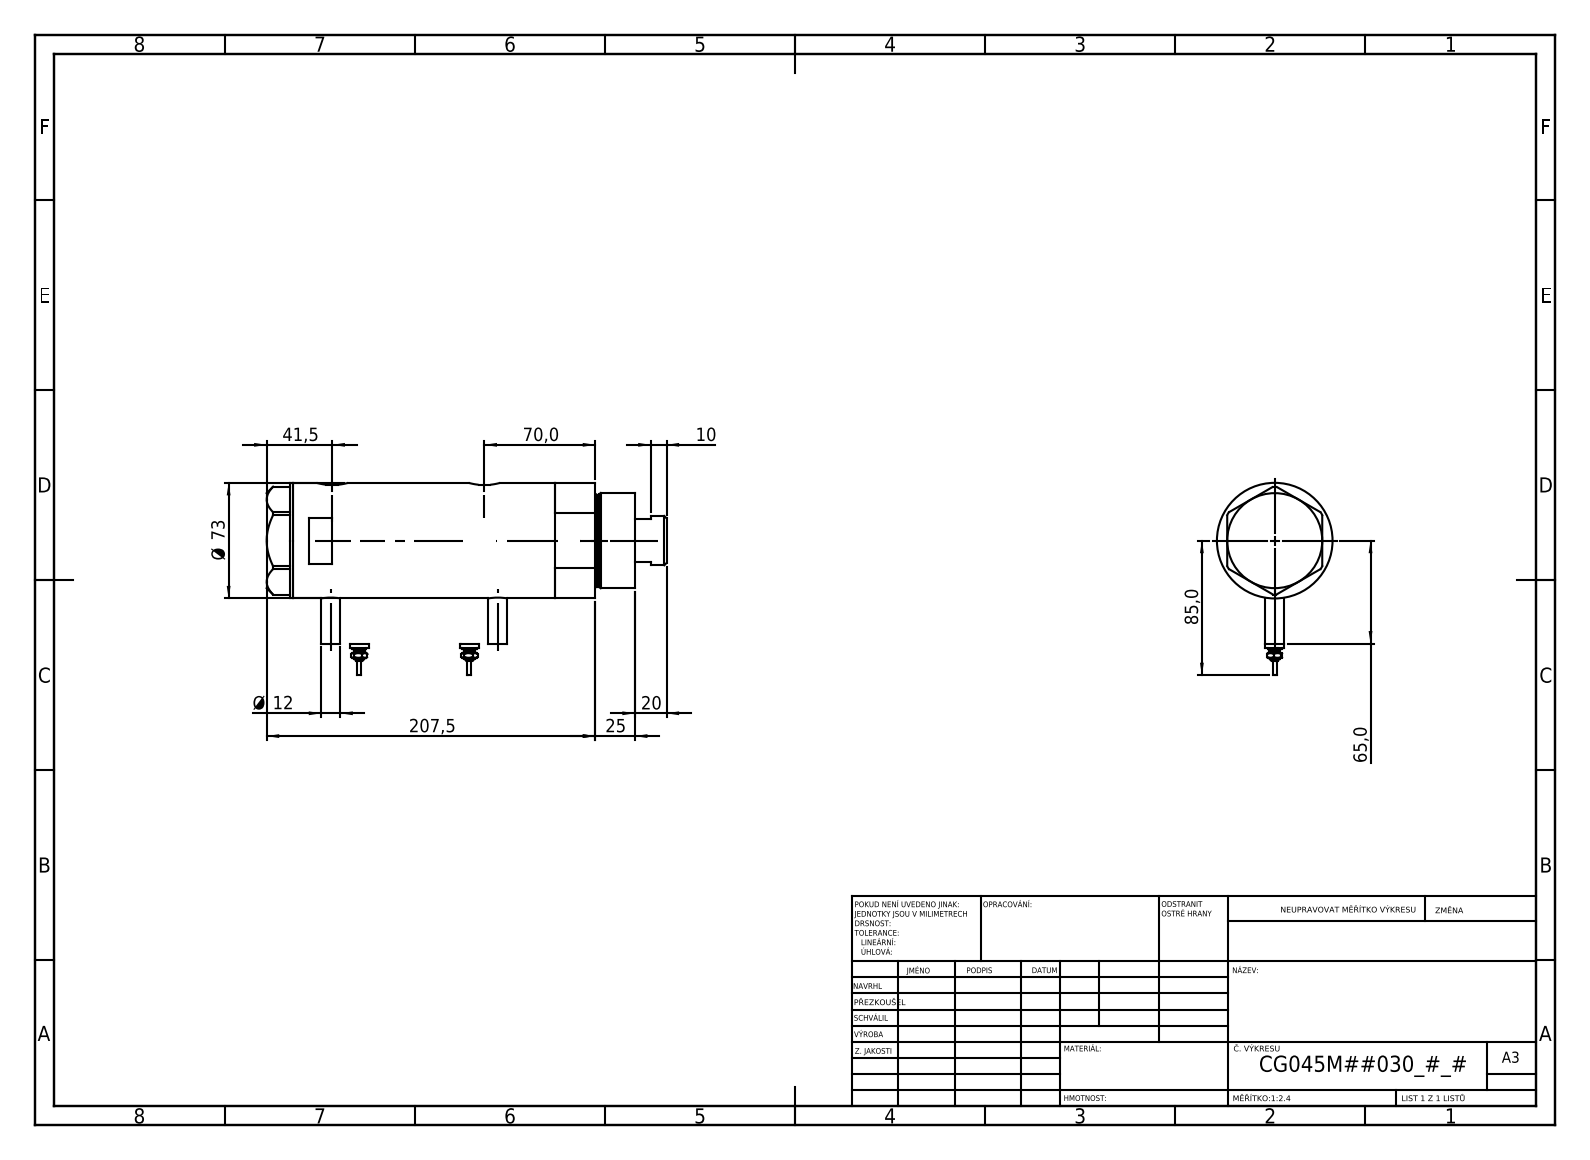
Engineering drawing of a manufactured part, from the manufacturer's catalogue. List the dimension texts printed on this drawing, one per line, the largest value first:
207,5
85,0
Ø 73
70,0
65,0
41,5
25
20
Ø 12
10
